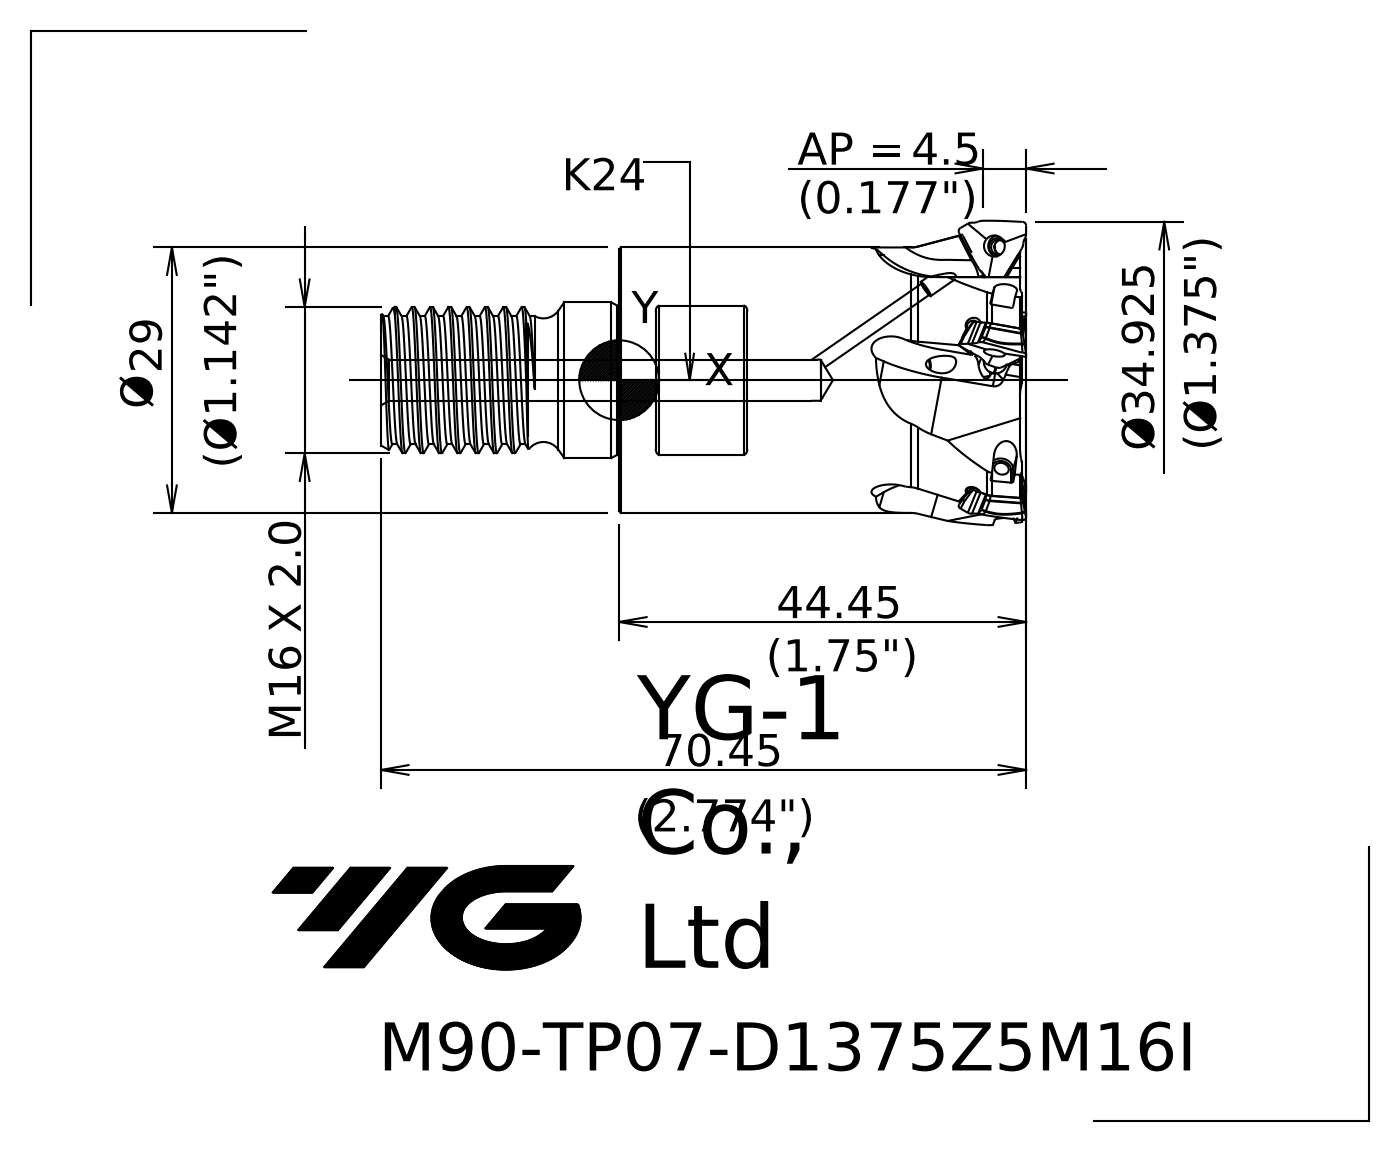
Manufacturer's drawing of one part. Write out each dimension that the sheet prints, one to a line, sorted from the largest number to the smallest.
70.45
44.45
Ø34.925
4.5 AP =
M X 2.0 16
